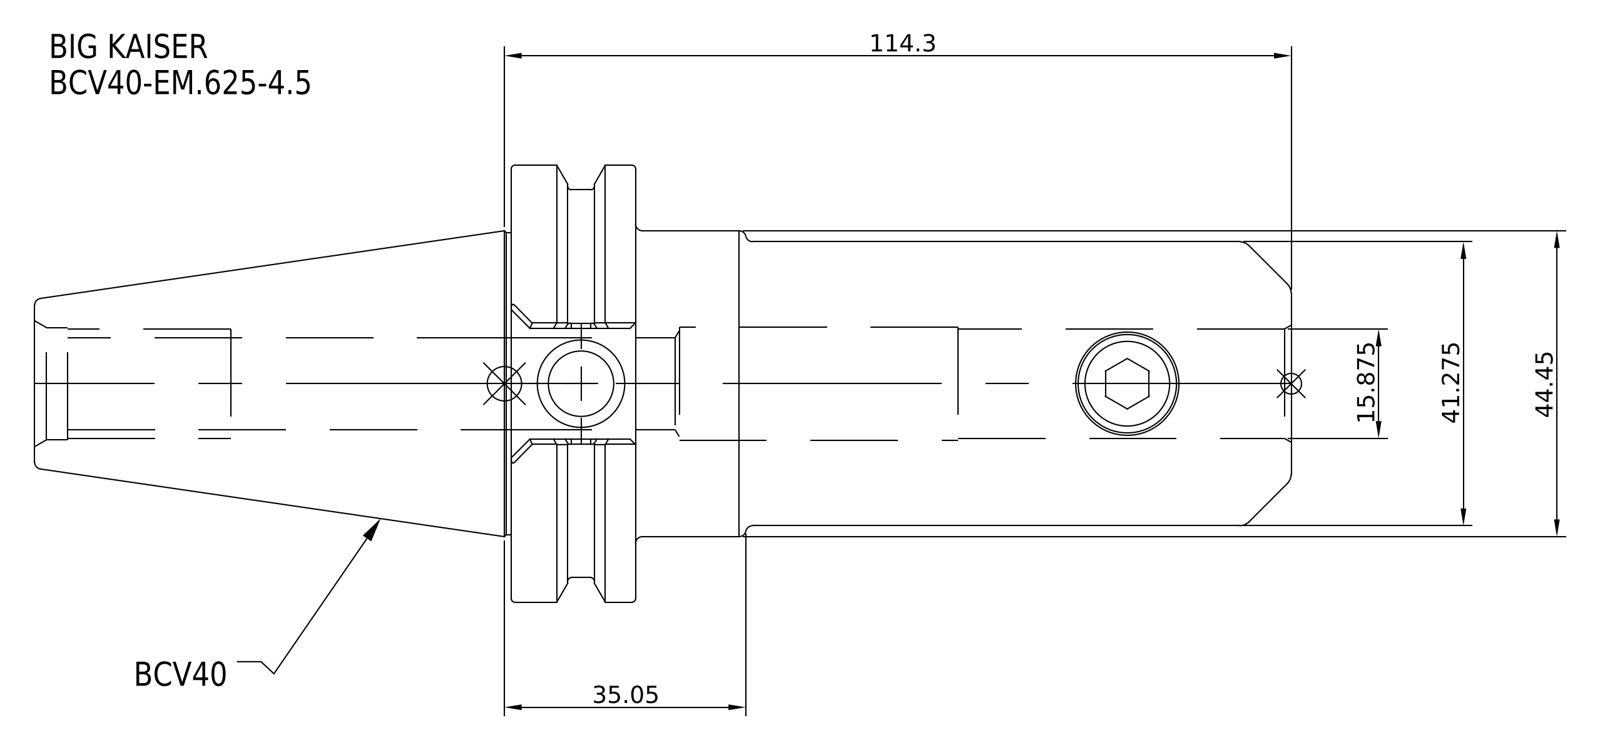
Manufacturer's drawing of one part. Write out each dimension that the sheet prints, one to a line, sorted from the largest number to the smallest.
114.3
44.45
41.275
35.05
15.875
